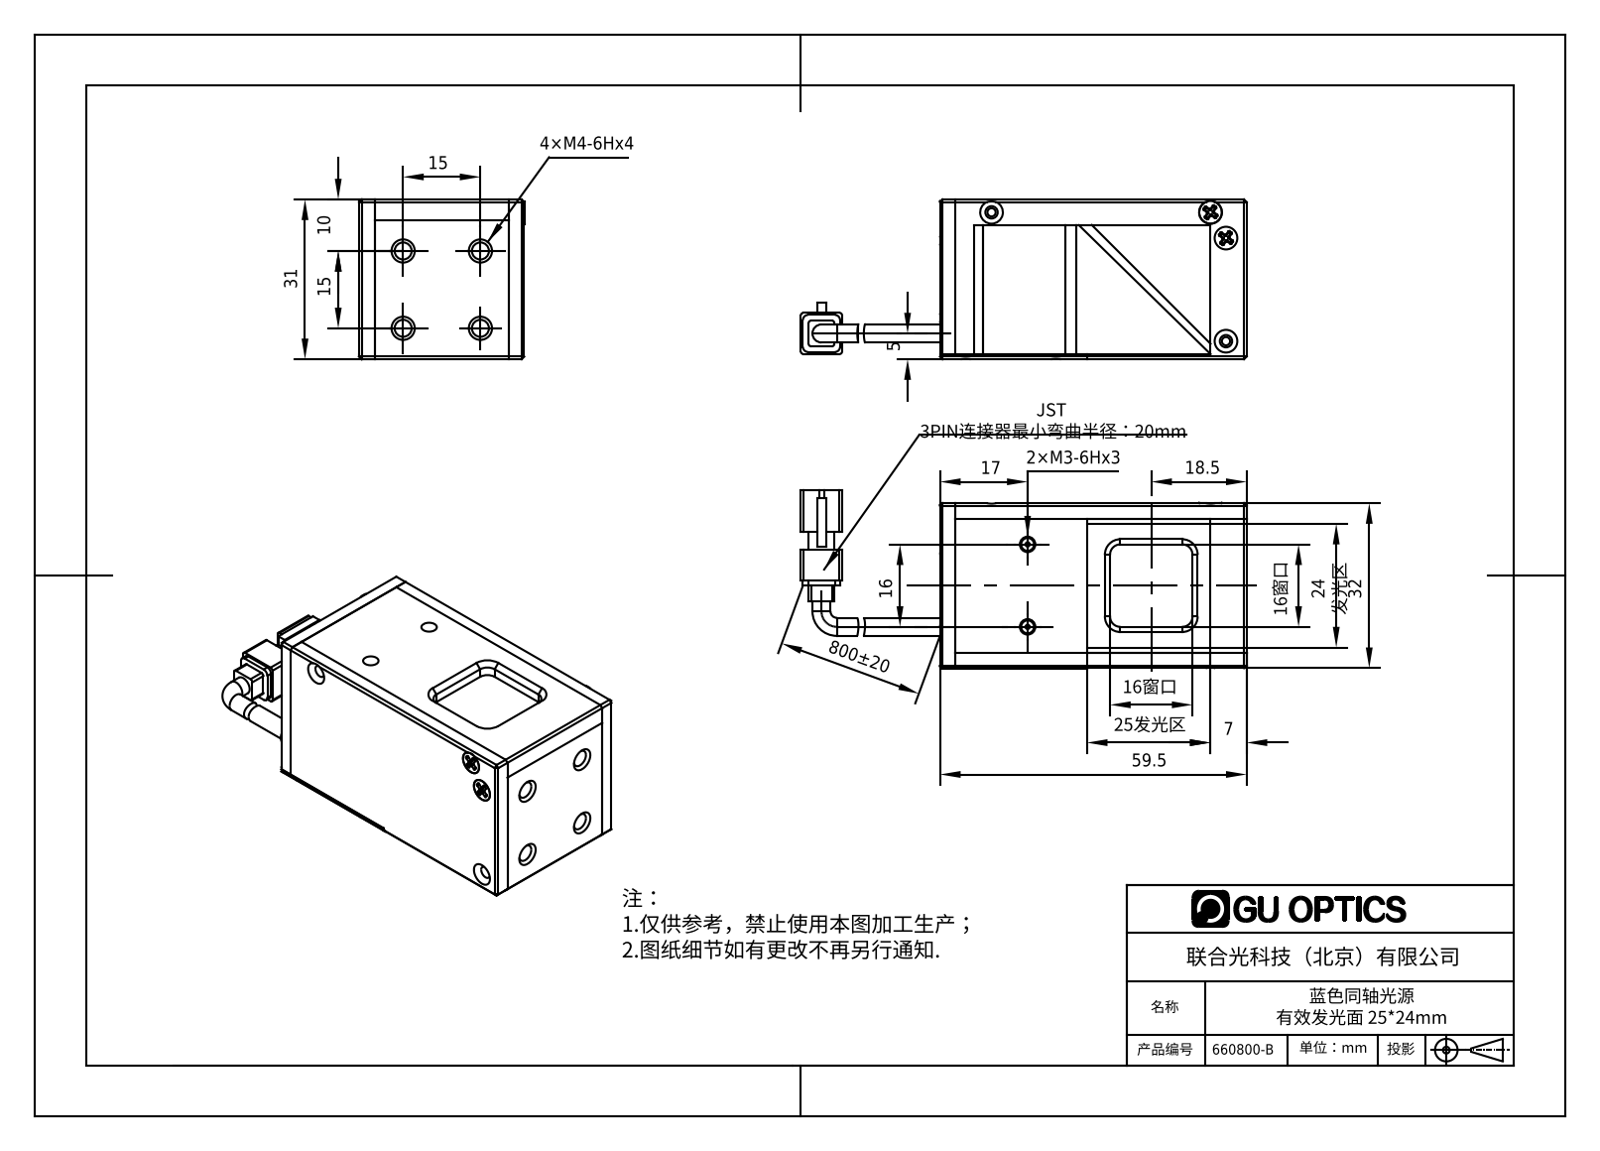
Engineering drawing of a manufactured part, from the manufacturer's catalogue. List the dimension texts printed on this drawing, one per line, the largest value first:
800±20
59.5
32
31
25发光区
24 发光区
18.5
17
16窗口
16窗口
16
15
15
10
7
5
